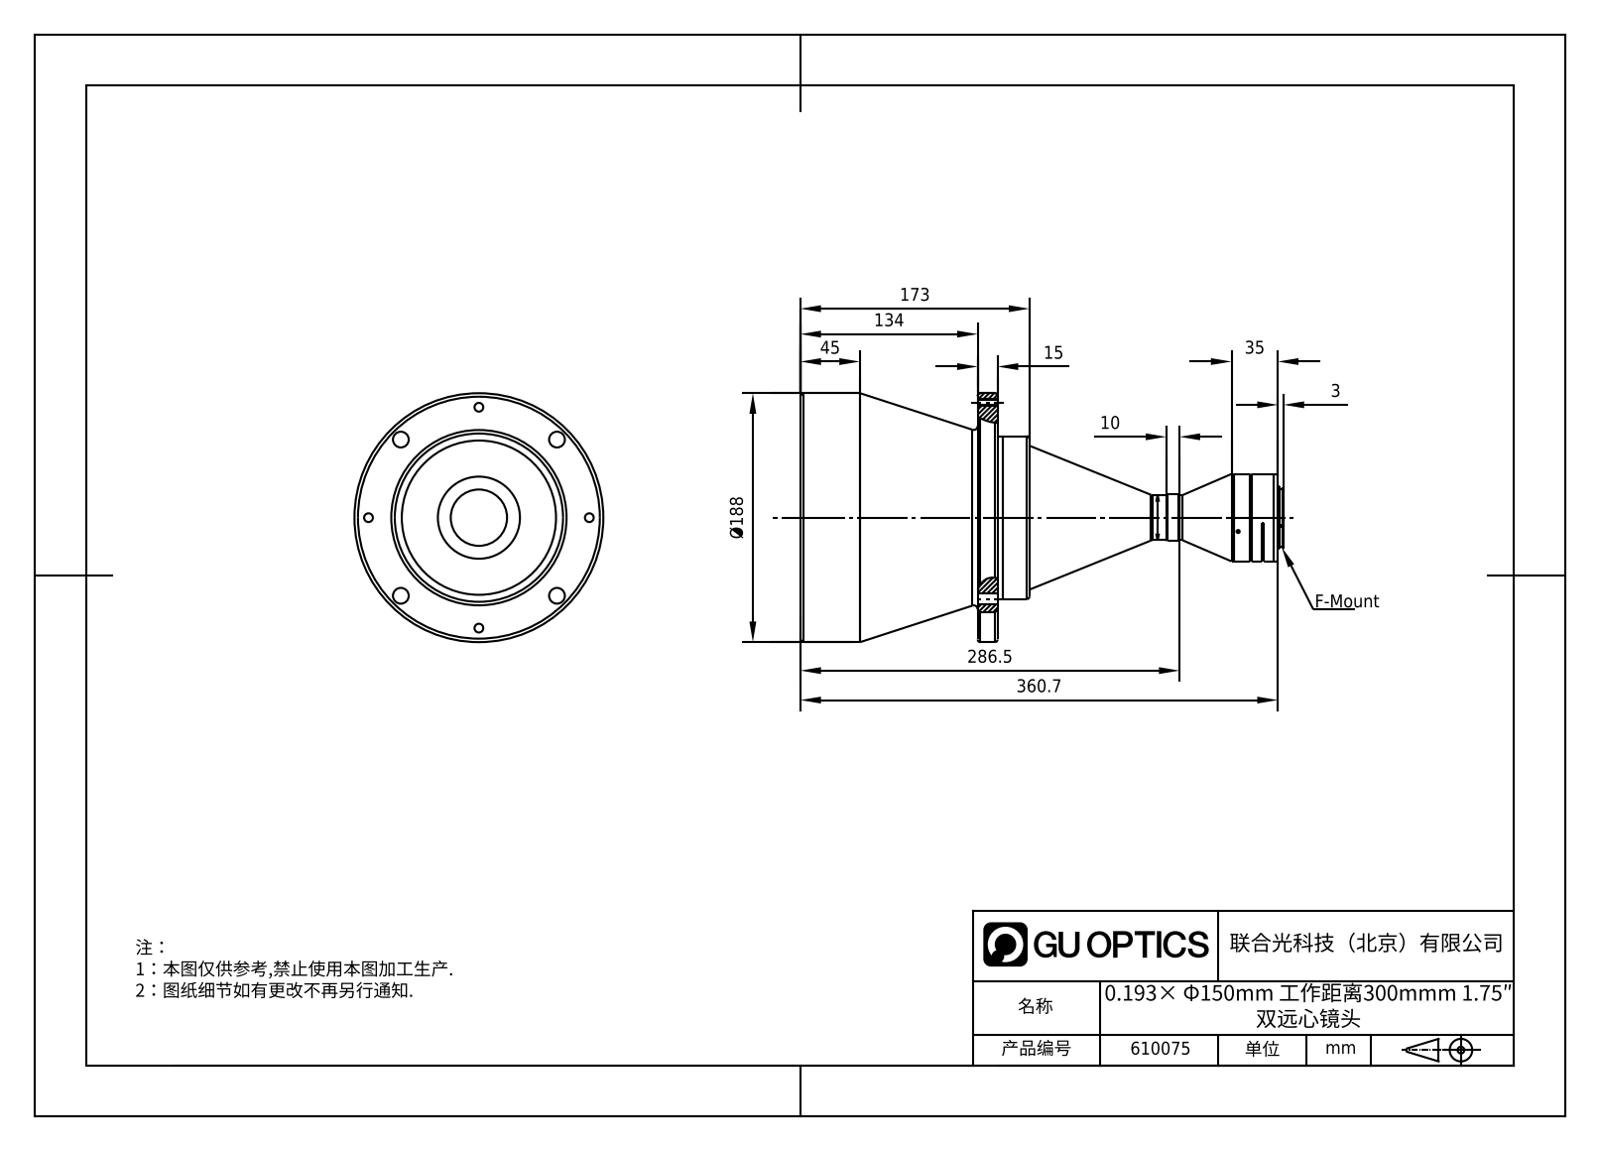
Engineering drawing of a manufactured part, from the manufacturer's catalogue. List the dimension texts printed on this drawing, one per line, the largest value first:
360.7
286.5
Ø188
173
134
45
35
15
10
3
